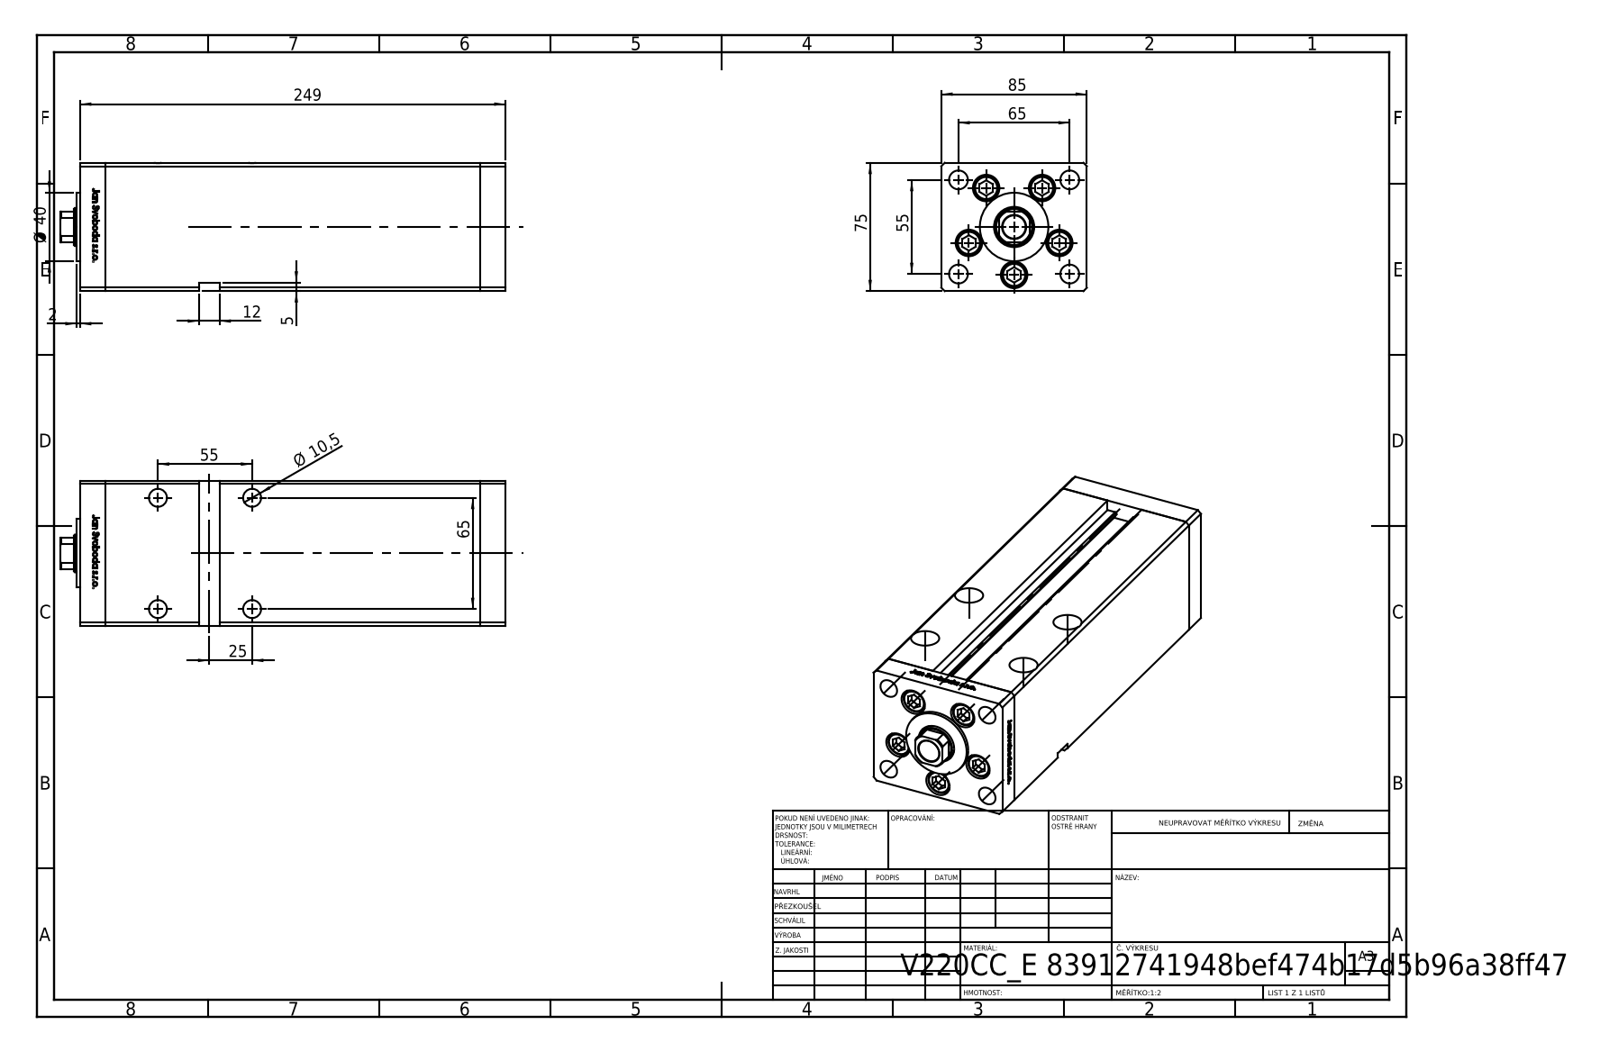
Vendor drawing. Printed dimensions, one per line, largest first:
249
85
75
65
65
55
55
Ø 40
25
12
Ø 10,5
5
2
